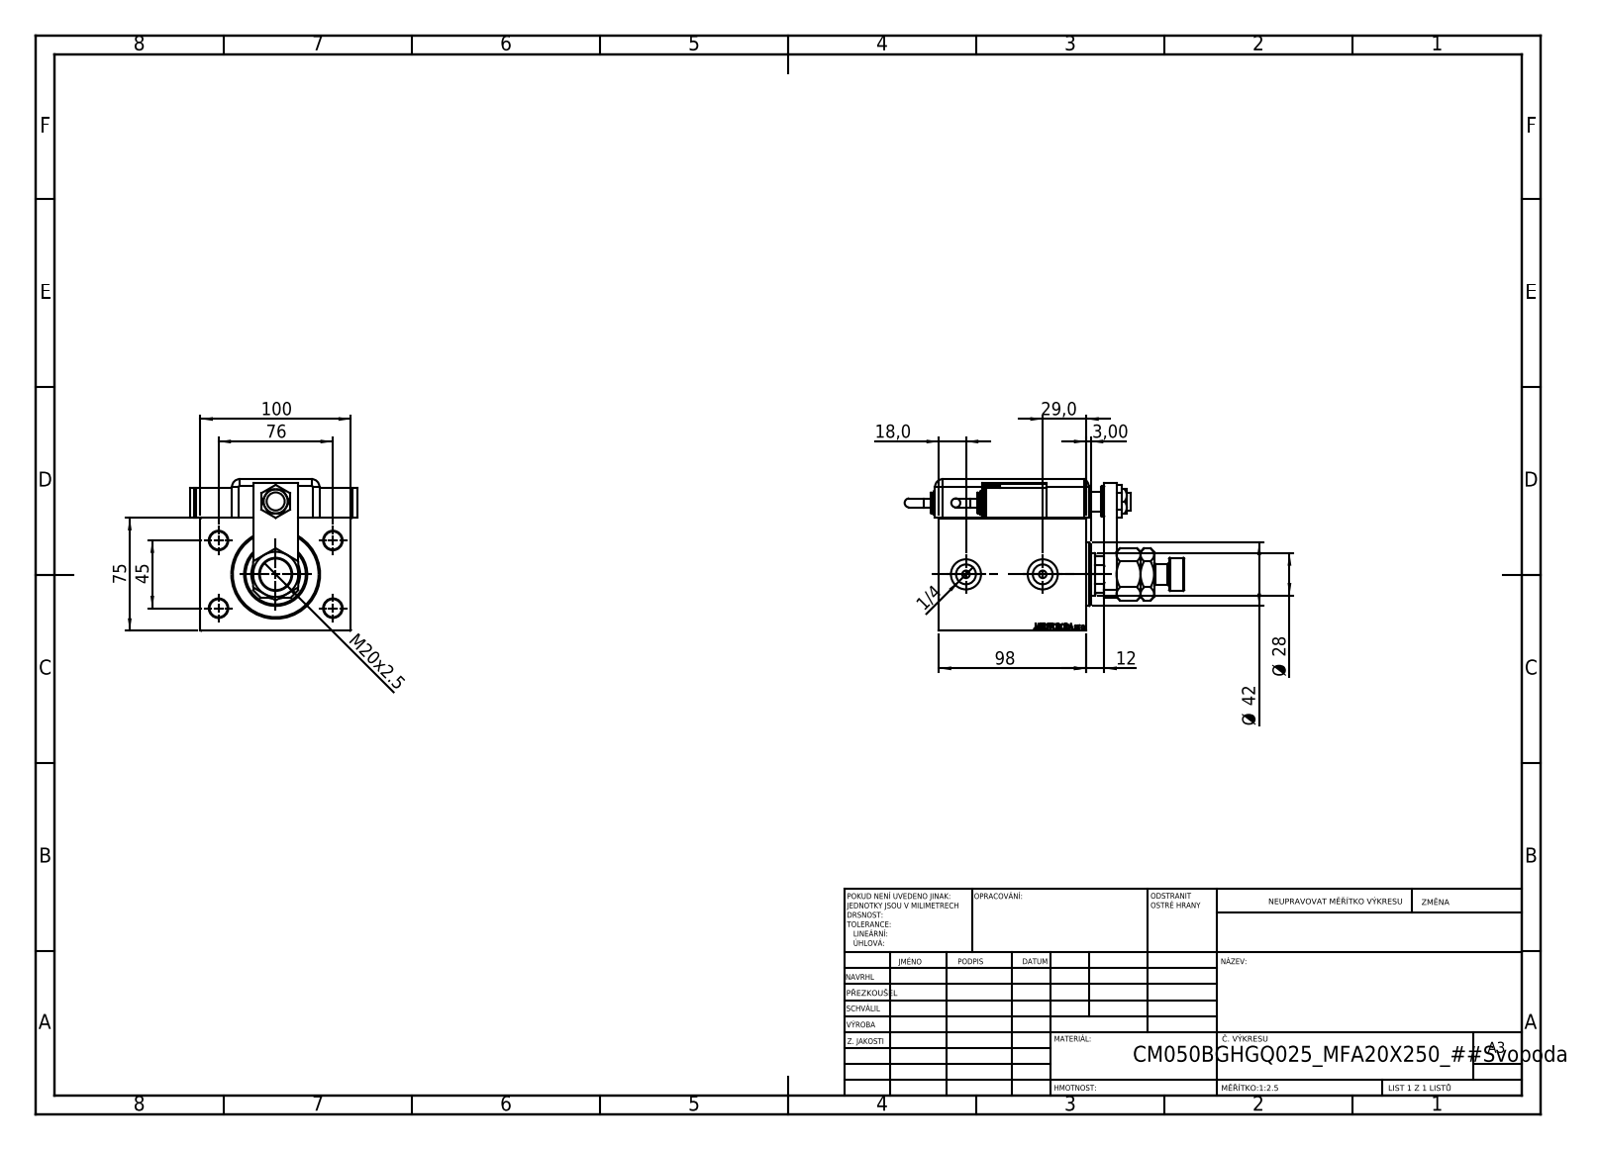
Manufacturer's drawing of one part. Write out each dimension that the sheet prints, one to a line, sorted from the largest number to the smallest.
100
98
76
75
45
Ø 42
29,0
Ø 28
M20x2.5
18,0
12
3,00
1/4
